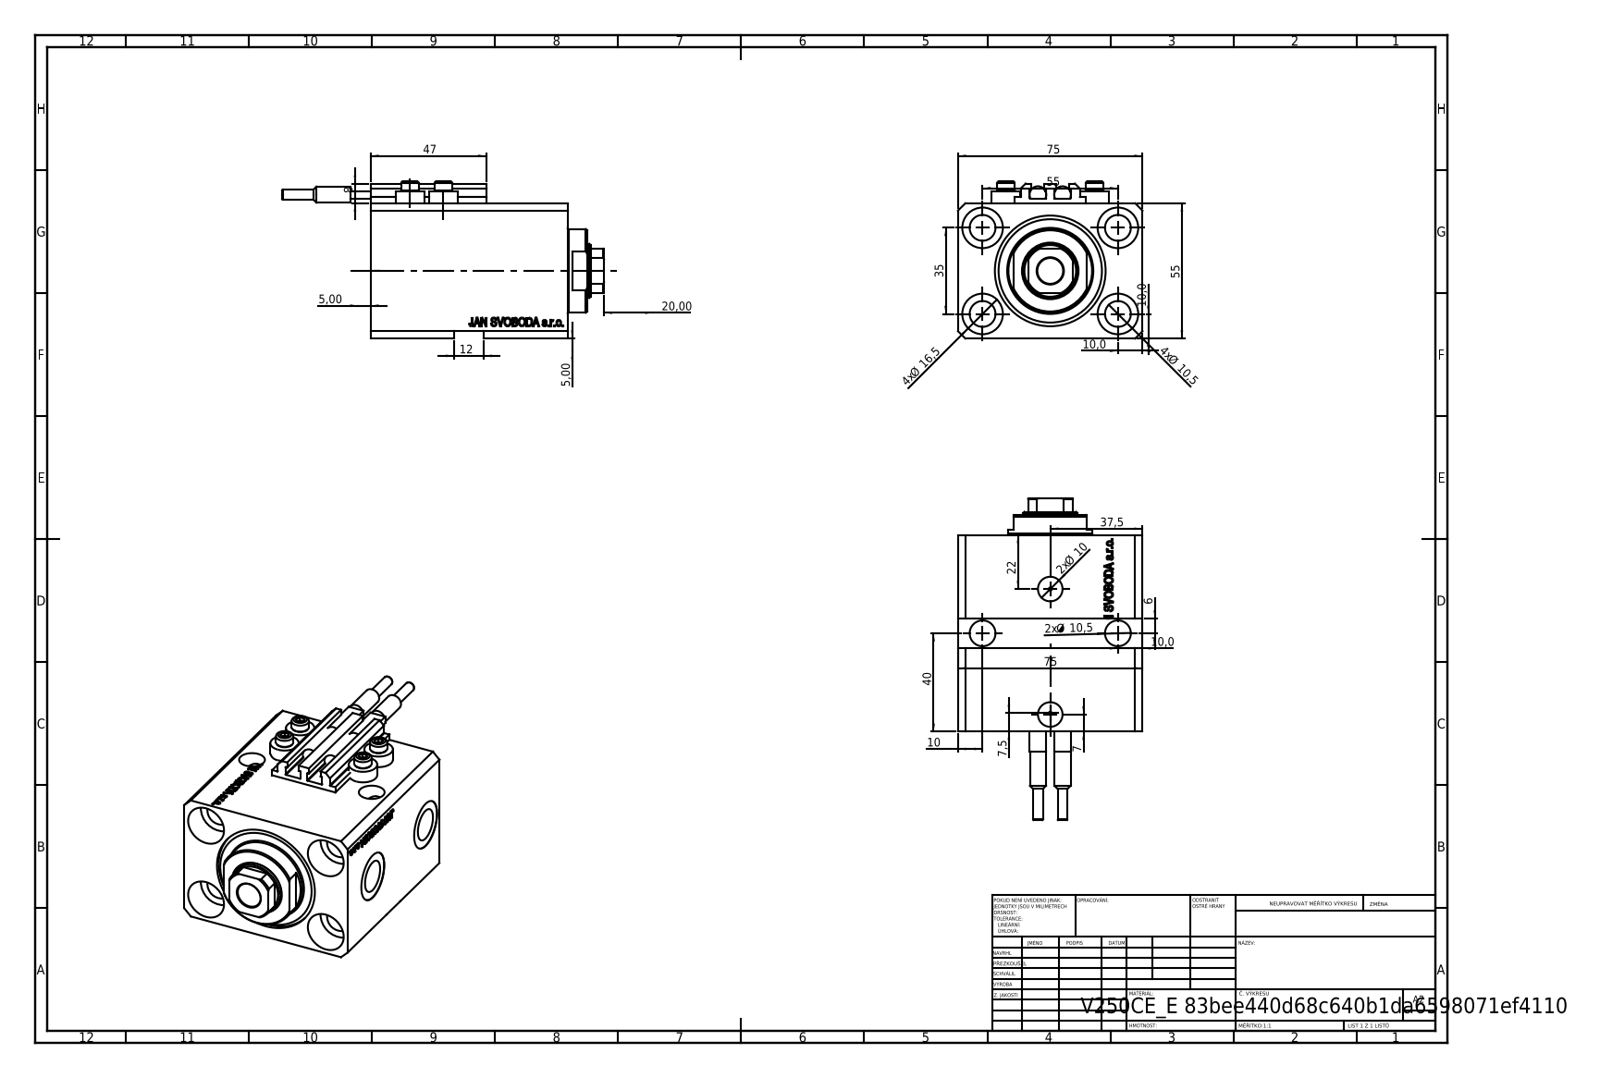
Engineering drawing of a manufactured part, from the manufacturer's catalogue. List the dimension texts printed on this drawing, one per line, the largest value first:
75
75
55
55
47
40
37,5
35
22
20,00
4x Ø 16,5
12
4x Ø 10,5
2x Ø 10,5
10,0
10,0
2x Ø 10
10,0
10
8
7,5
7
6
5,00
5,00
